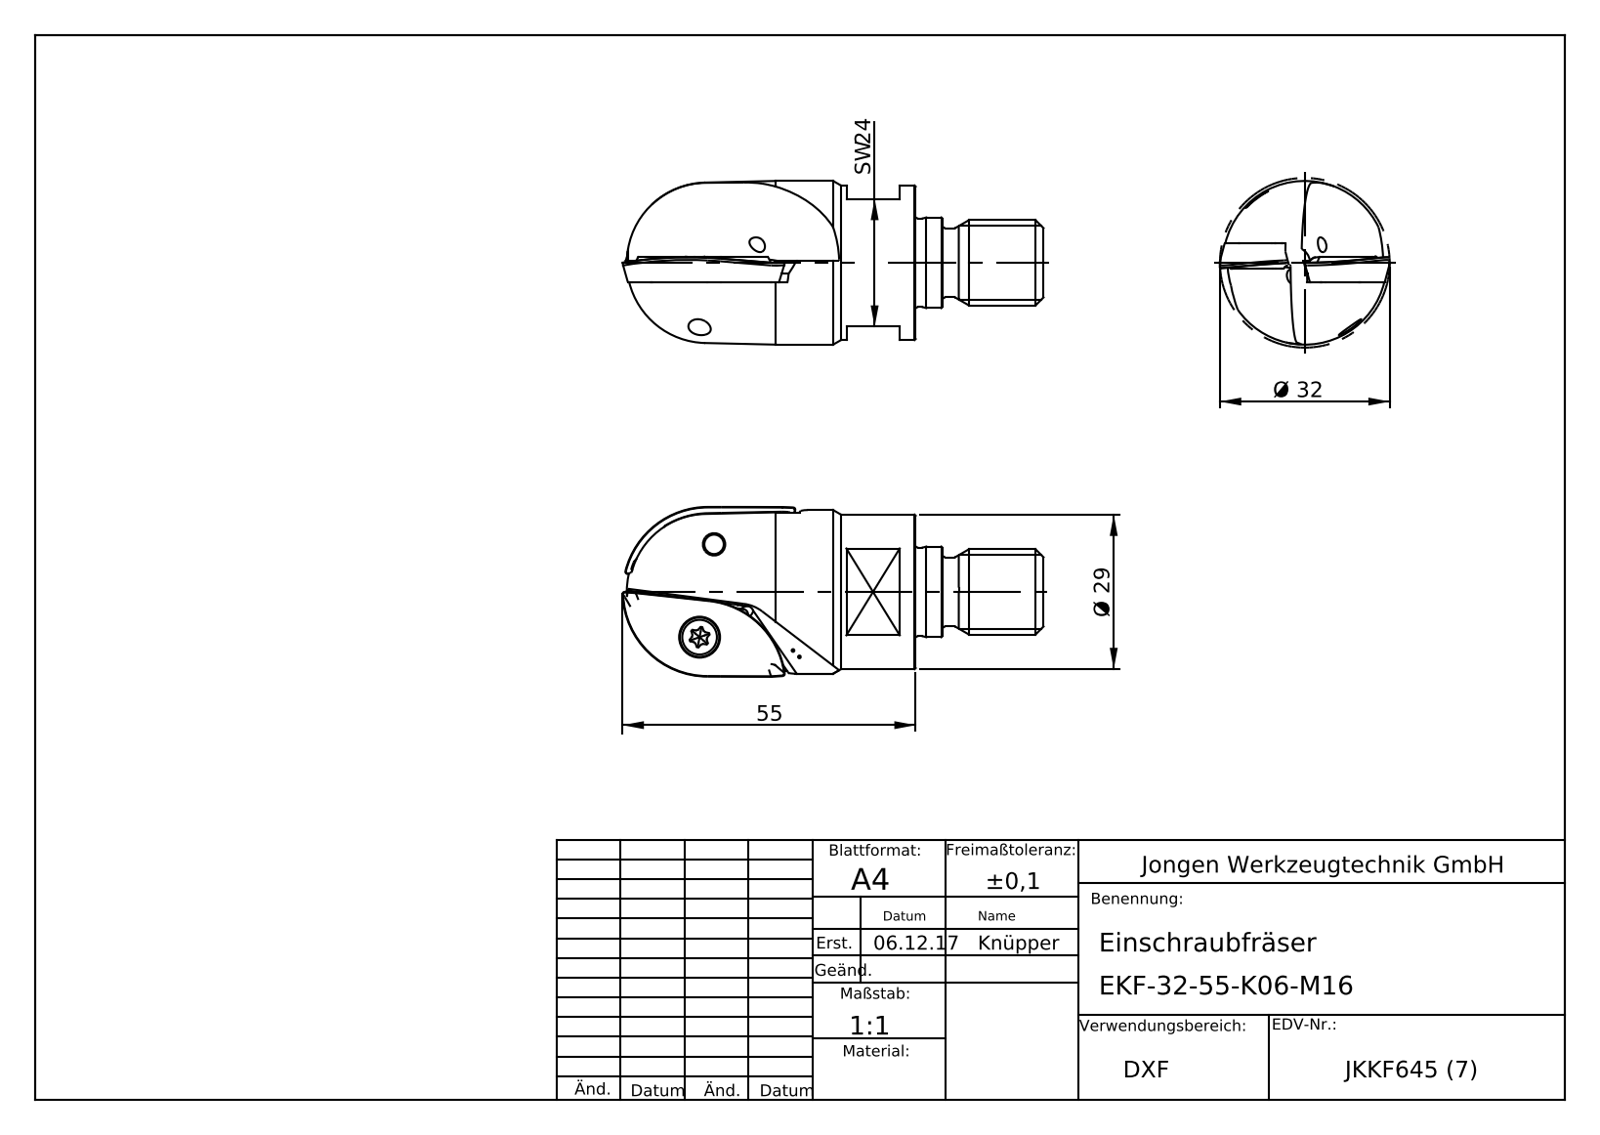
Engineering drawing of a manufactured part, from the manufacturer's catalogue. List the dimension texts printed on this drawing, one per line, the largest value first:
55
Ø 32
Ø 29
SW 24
